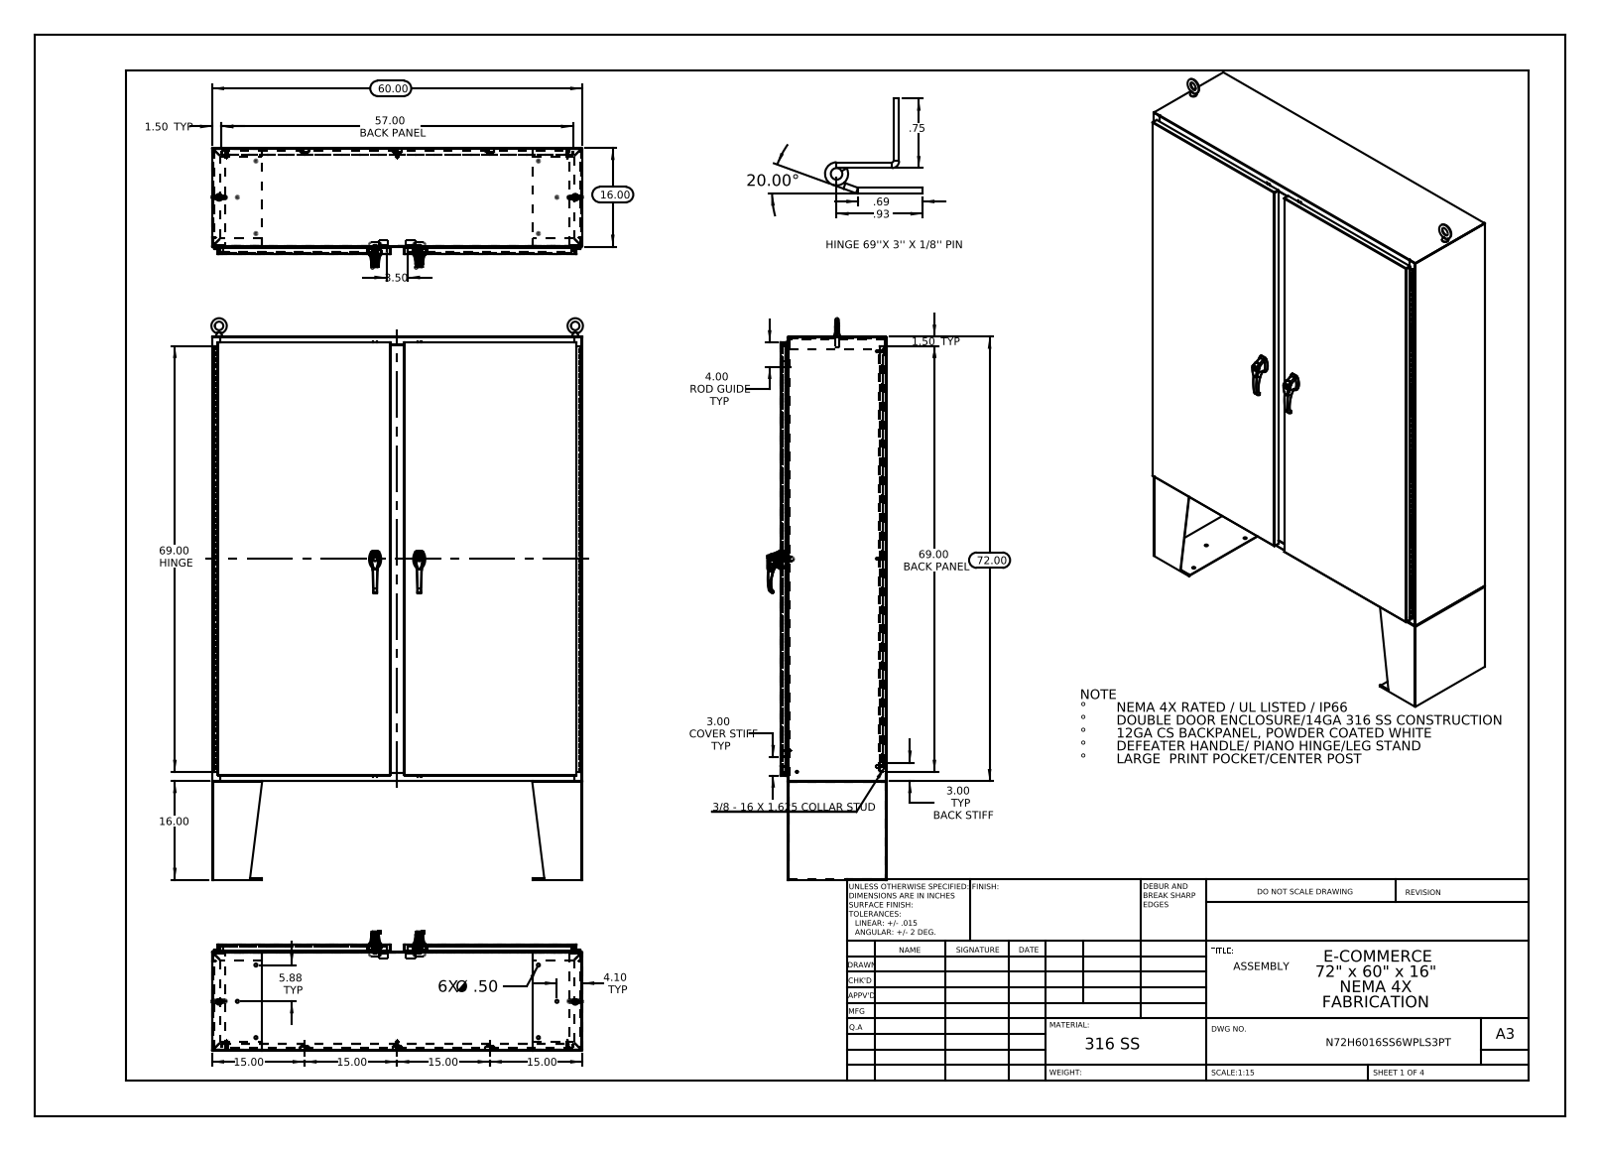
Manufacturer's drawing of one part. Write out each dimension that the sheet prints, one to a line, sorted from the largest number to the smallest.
72.00
69.00 HINGE
69.00 BACK PANEL
60.00
57.00 BACK PANEL
20.00°
16.00
16.00
15.00
15.00
15.00
15.00
5.88 TYP
4.10 TYP
4.00 ROD GUIDE TYP
3.50
3.00 TYP BACK STIFF
3.00 COVER STIFF TYP
1.50 TYP
1.50 TYP
.93
.75
.69
6X Ø .50
